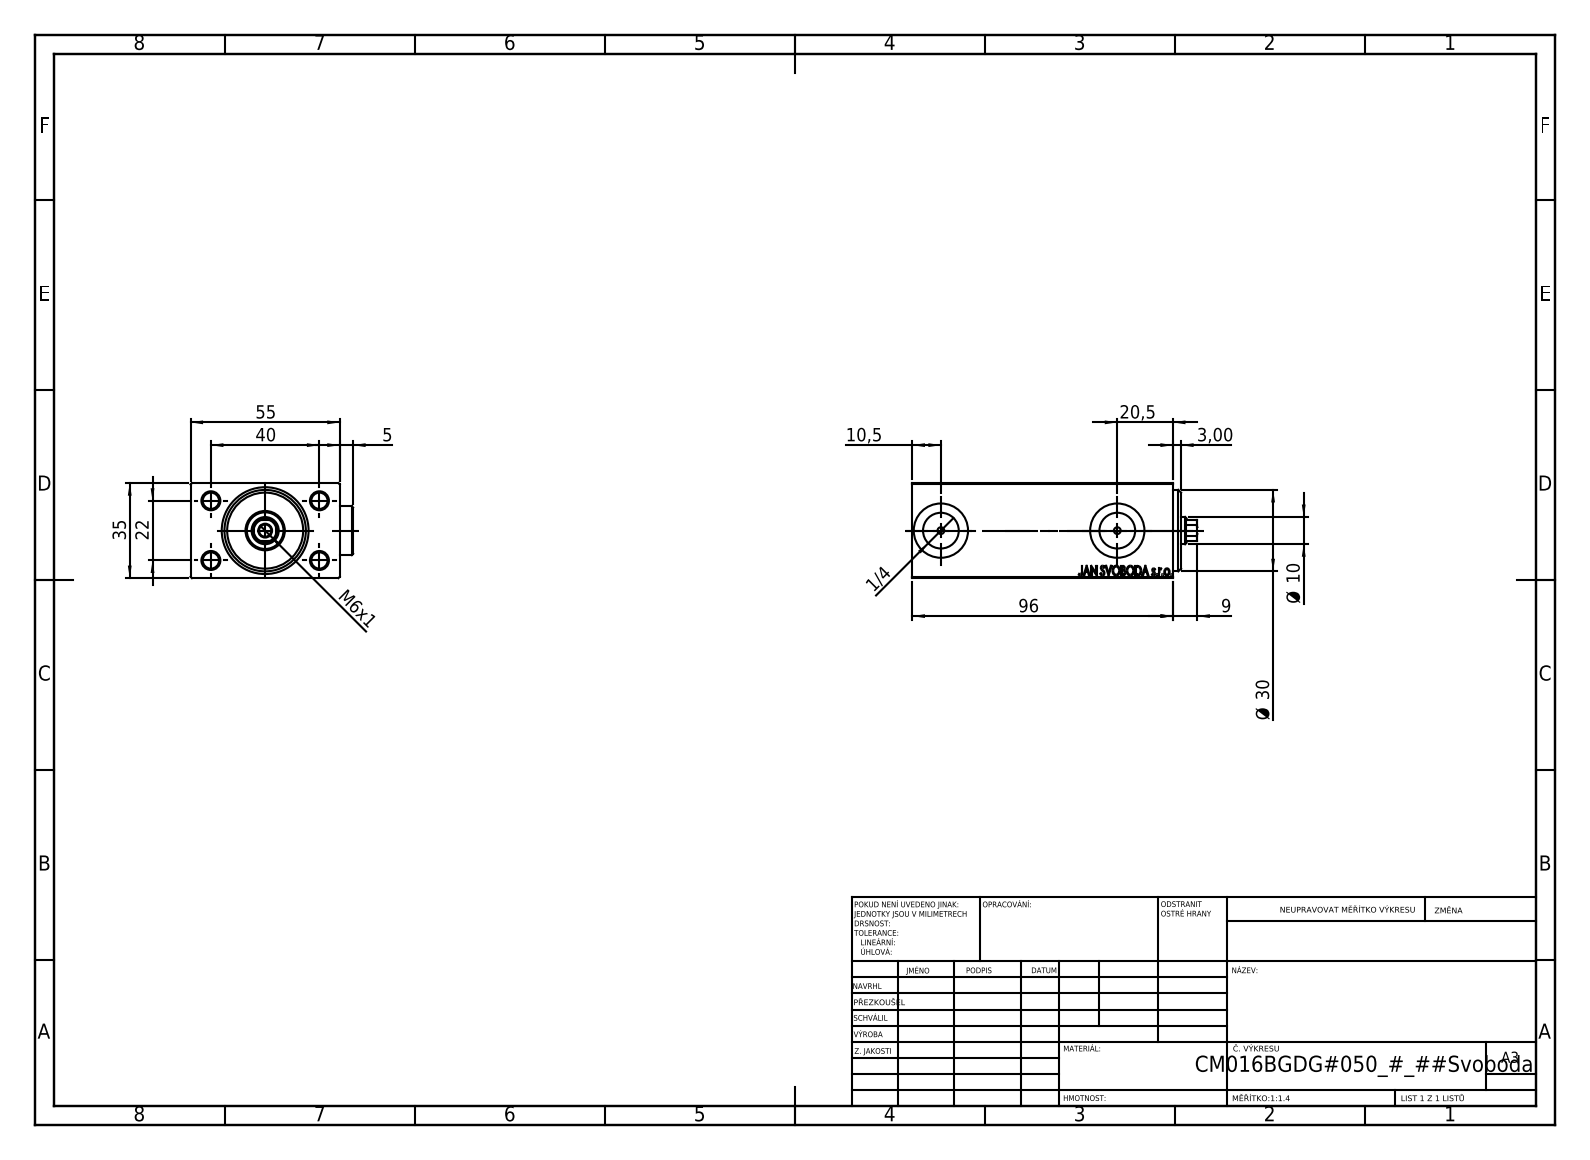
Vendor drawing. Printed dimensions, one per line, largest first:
96
55
40
35
Ø 30
22
20,5
10,5
Ø 10
9
M6x1
5
3,00
1/4
